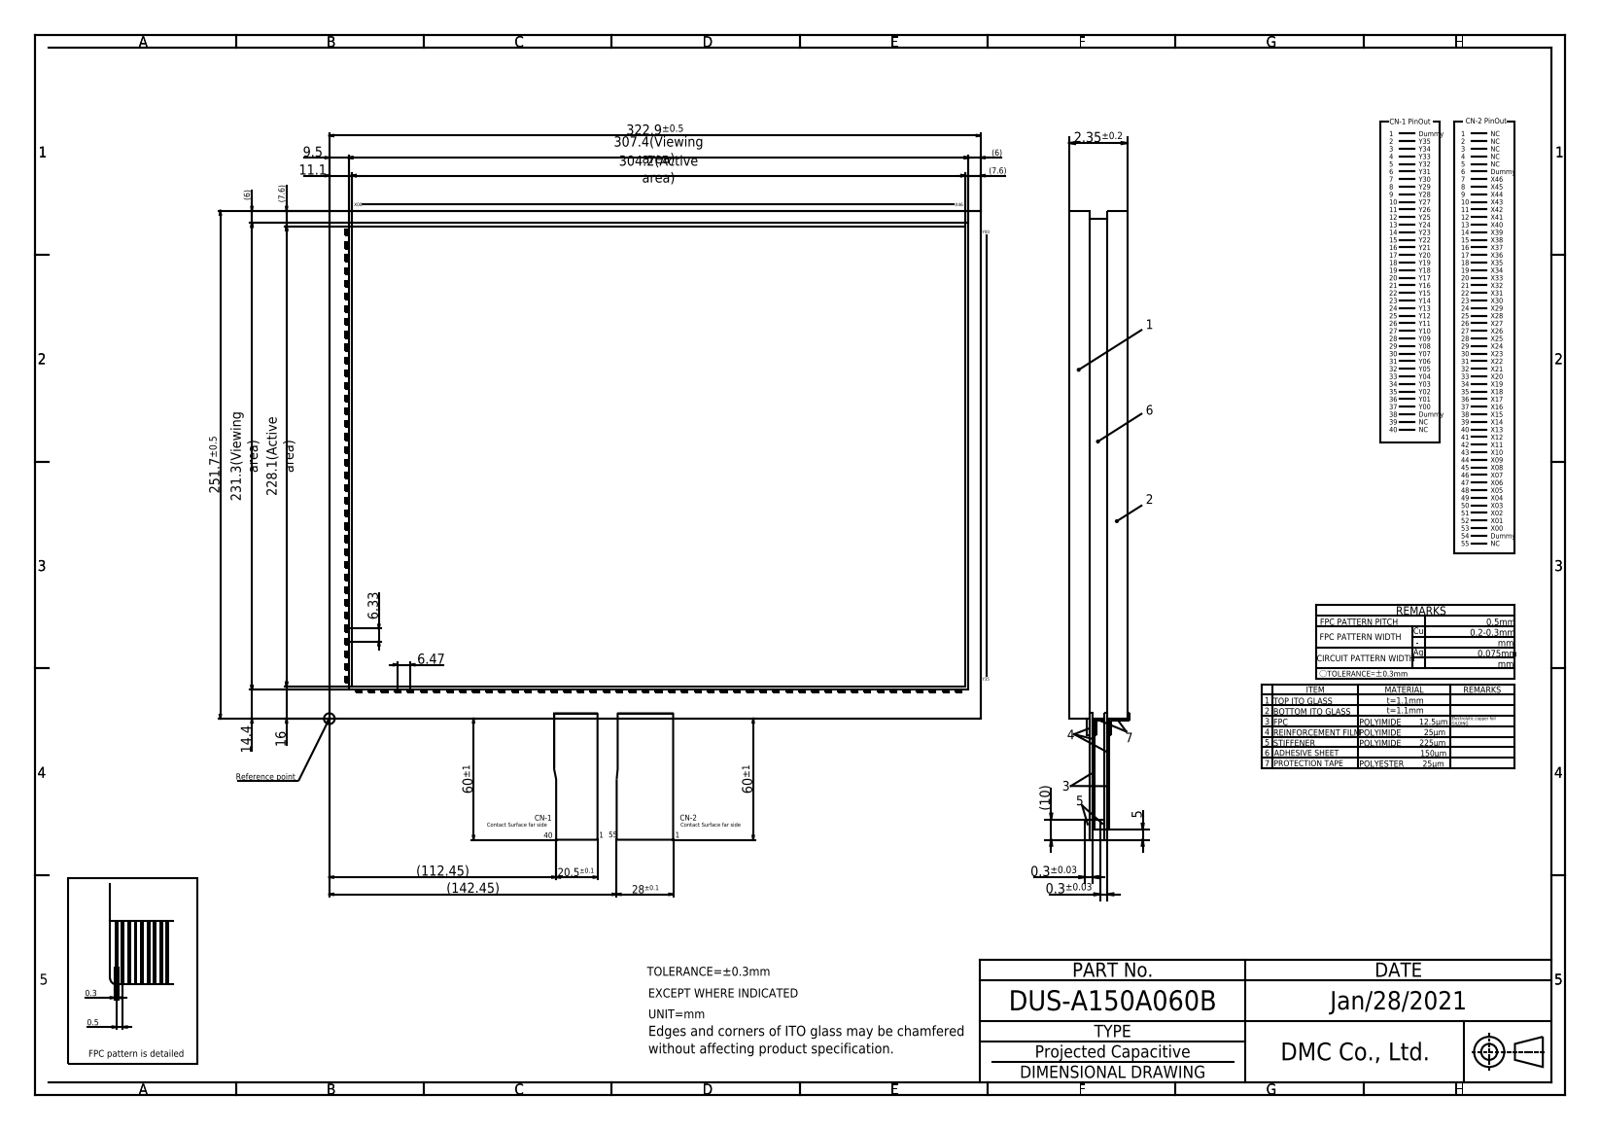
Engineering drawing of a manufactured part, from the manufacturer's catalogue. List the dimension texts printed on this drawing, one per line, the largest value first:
322.9±0.5
307.4(Viewing area)
304.2(Active area)
251.7±0.5
231.3(Viewing area)
228.1(Active area)
(142.45)
(112.45)
60±1
60±1
28±0.1
20.5±0.1
16
14.4
11.1
(10)
9.5
(7.6)
(7.6)
6.47
6.33
(6)
(6)
5
2.35±0.2
0.5
0.3
0.3±0.03
0.3±0.03
